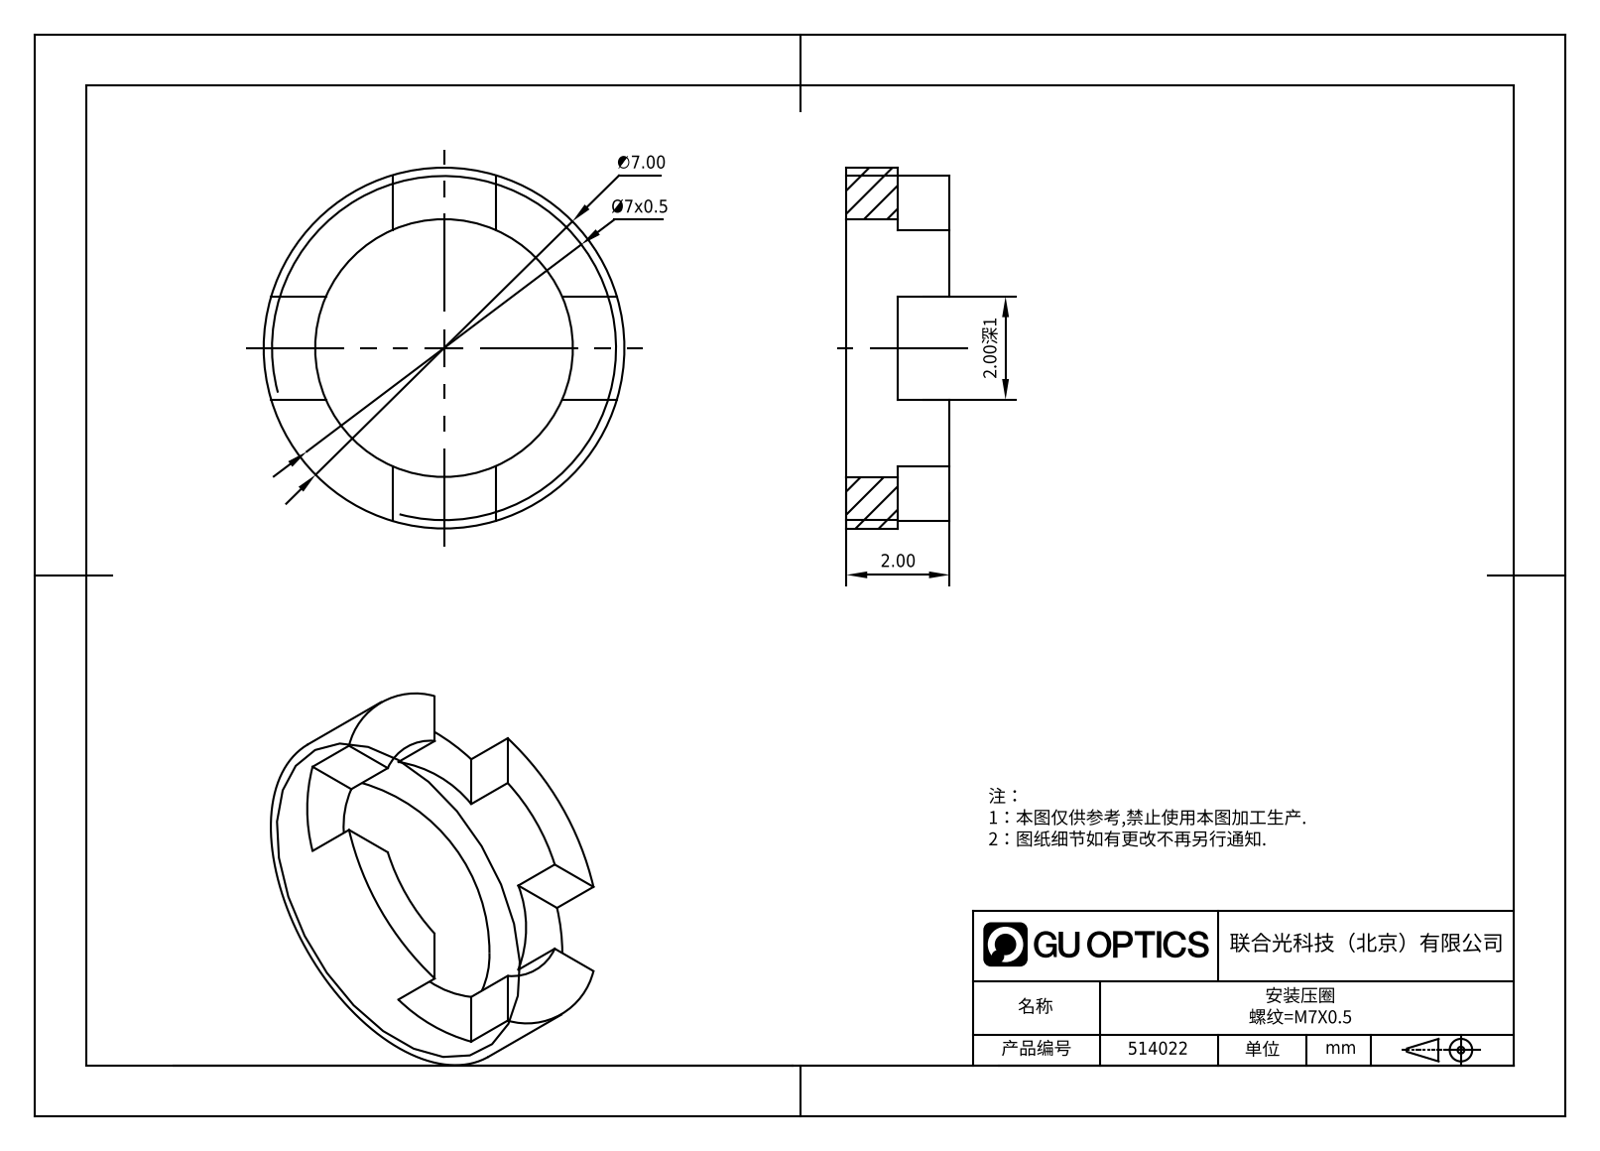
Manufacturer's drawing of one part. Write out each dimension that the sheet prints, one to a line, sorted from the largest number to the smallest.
∅7.00
Ø7x0.5
2.00
2.00深1
